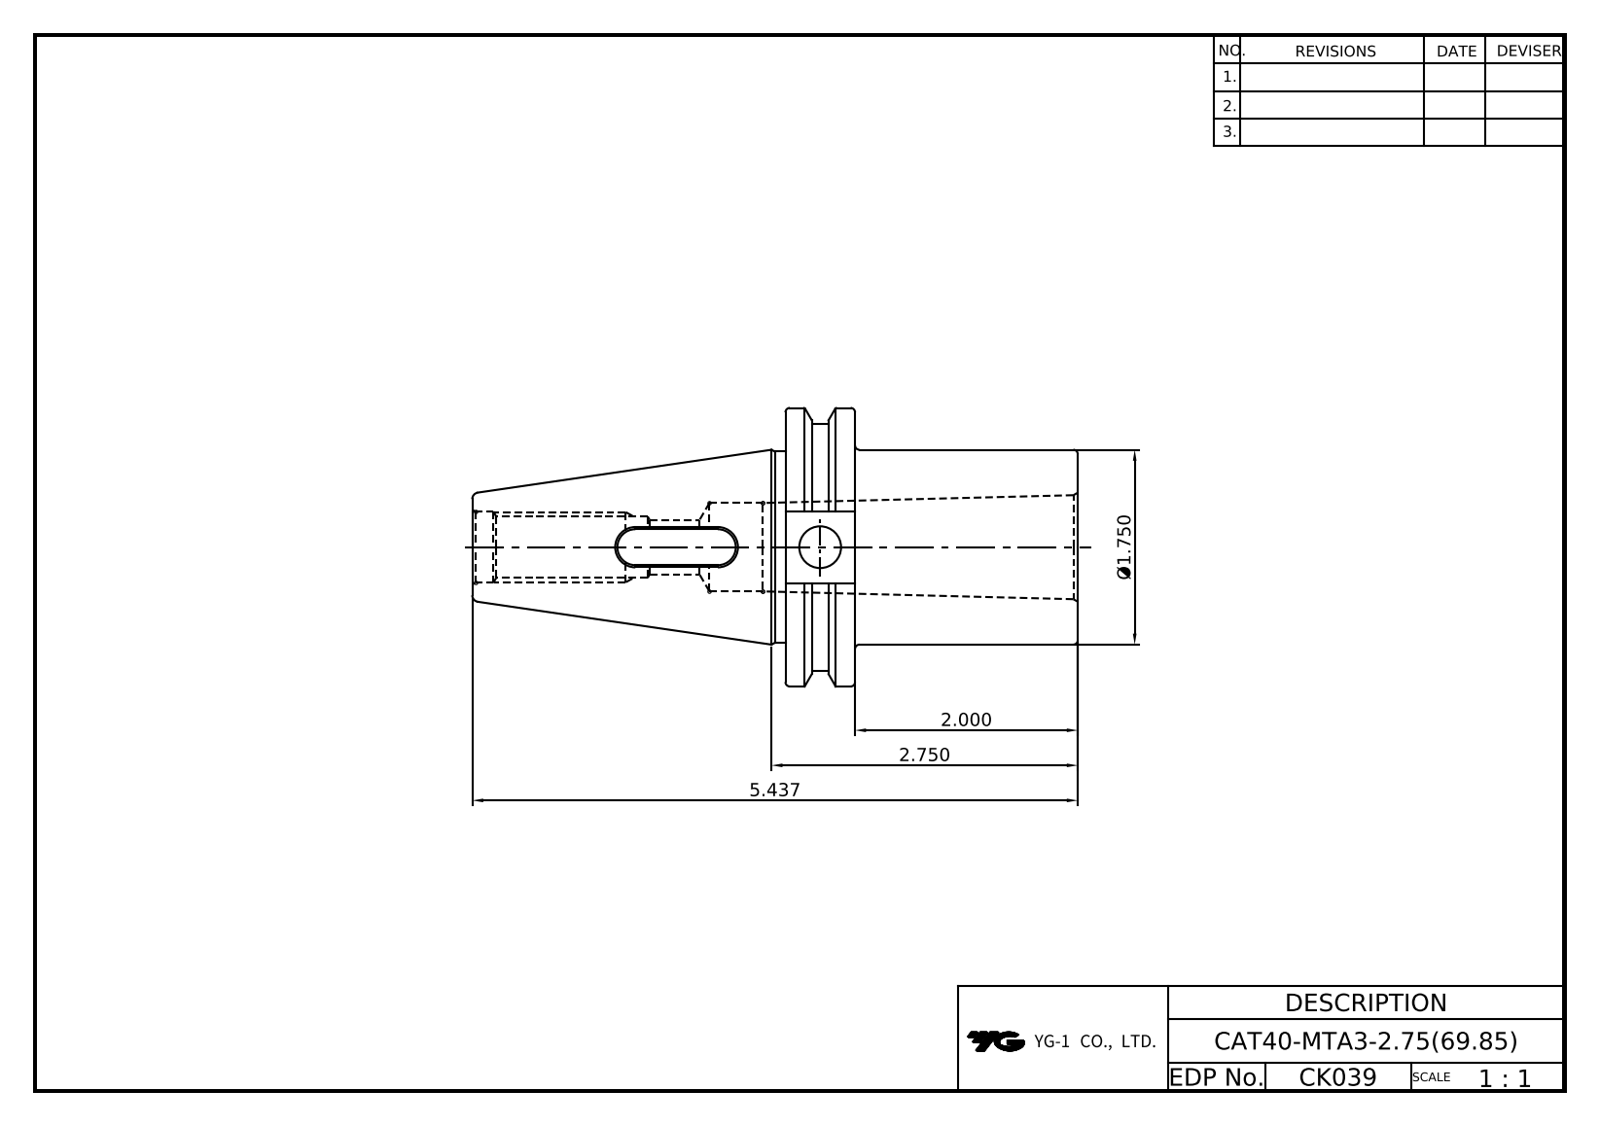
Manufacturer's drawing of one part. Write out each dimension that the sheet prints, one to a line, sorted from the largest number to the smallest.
5.437
2.750
2.000
Ø1.750
